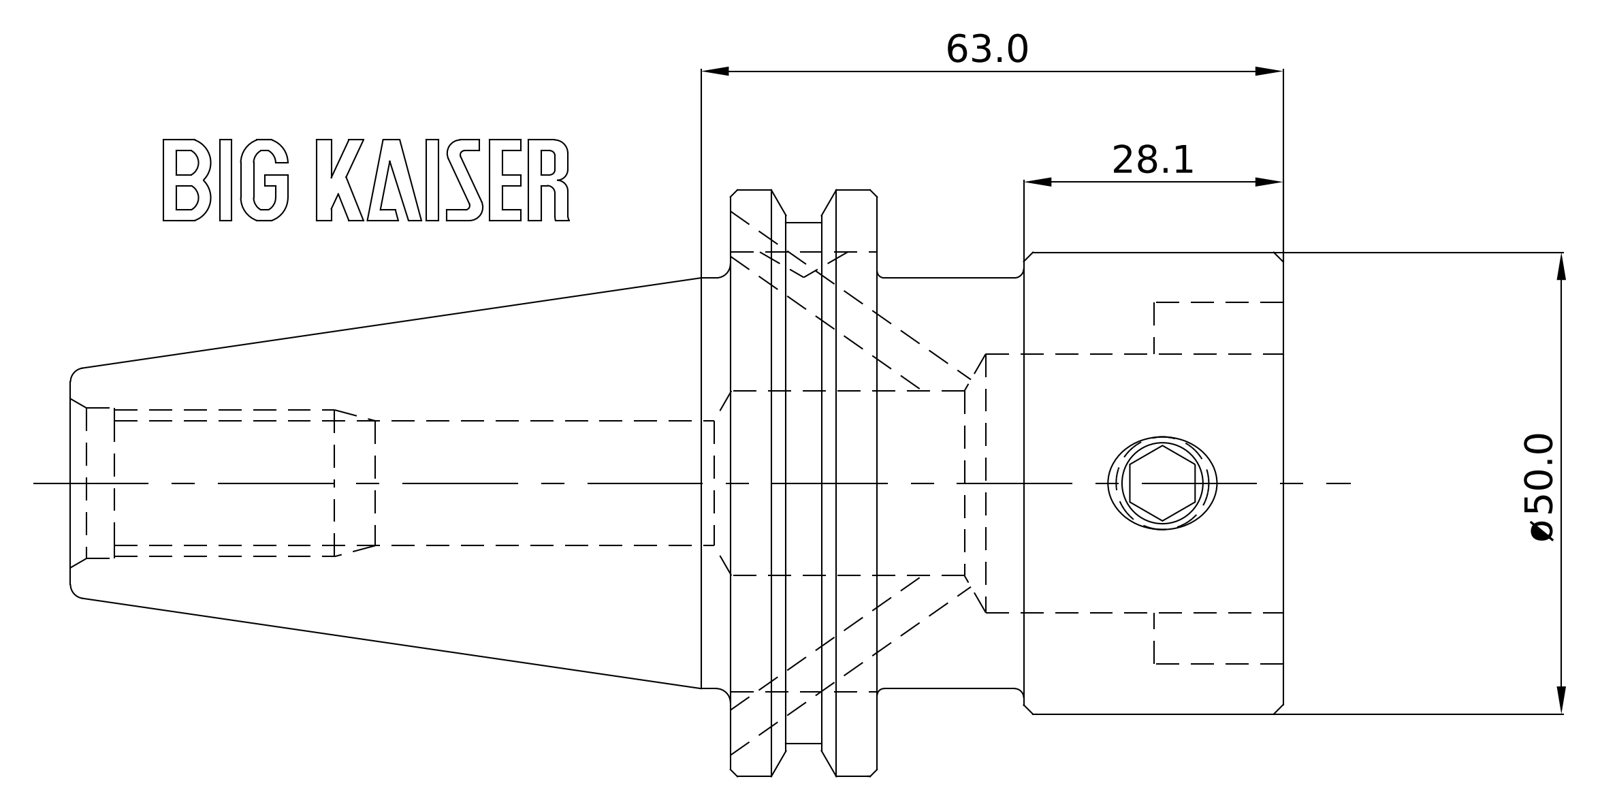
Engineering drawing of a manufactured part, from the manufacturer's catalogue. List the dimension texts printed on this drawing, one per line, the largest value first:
63.0
Ø50.0
28.1
